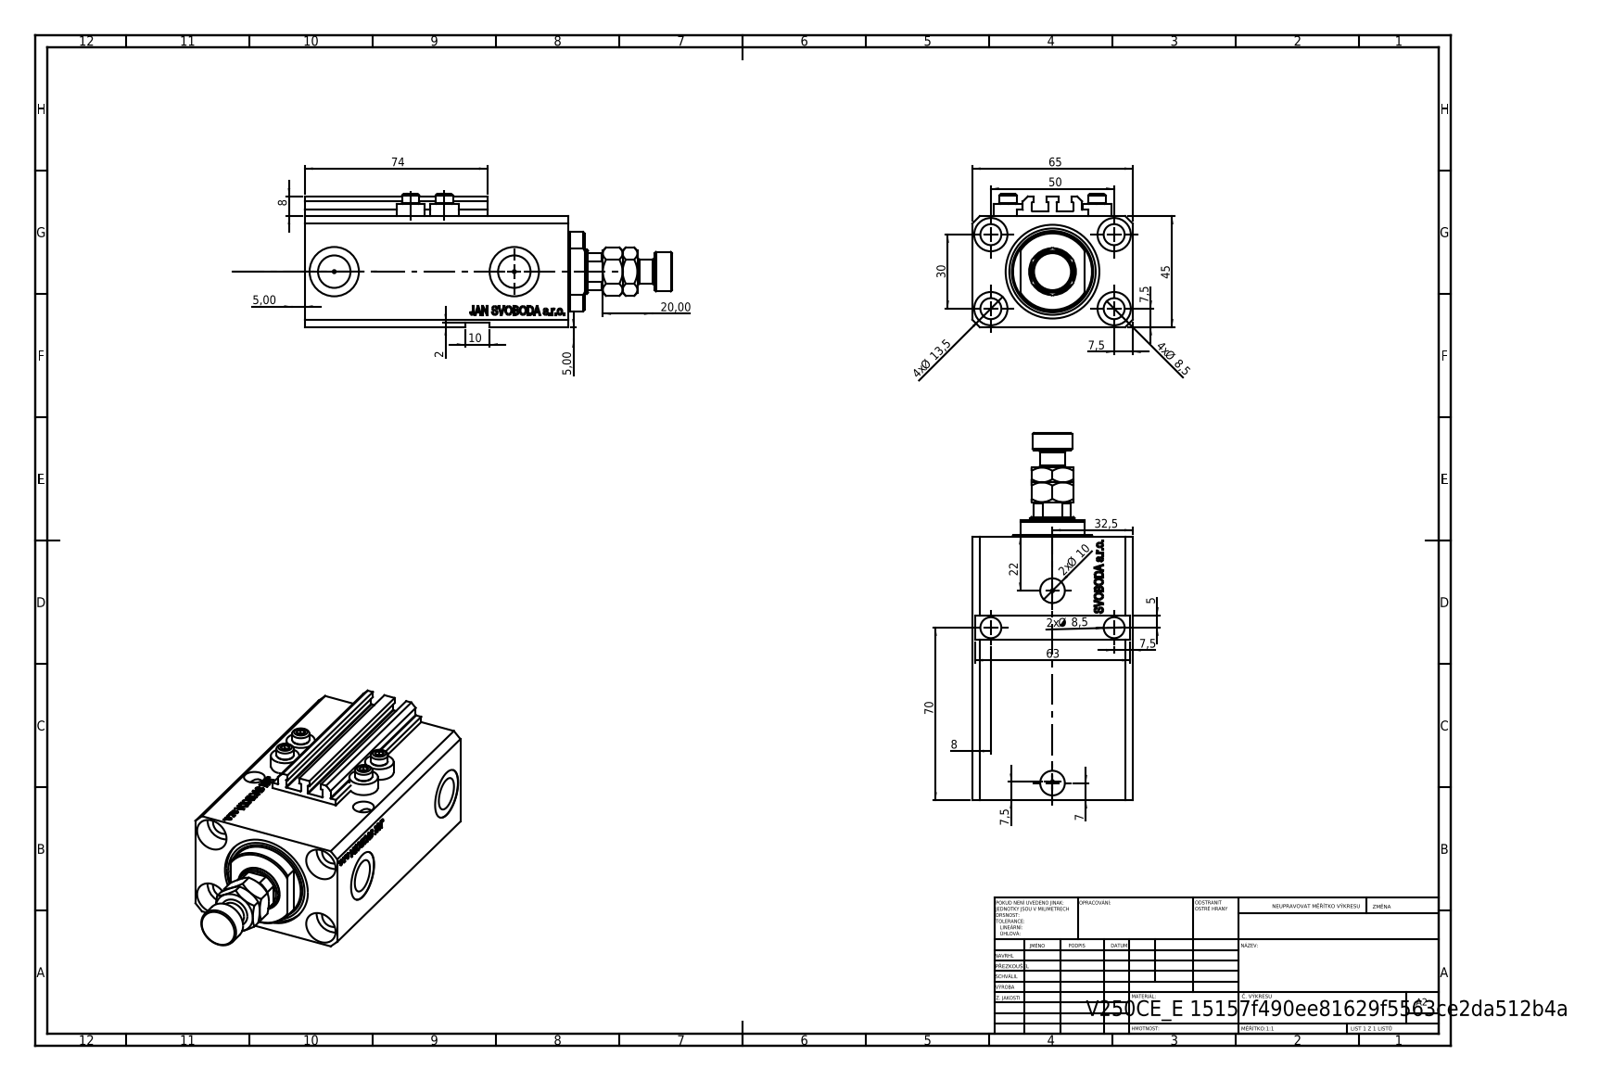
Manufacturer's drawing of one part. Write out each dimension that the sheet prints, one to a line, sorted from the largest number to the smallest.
74
70
65
63
50
45
32,5
30
22
20,00
4x Ø 13,5
10
2x Ø 10
4x Ø 8,5
2x Ø 8,5
8
8
7,5
7,5
7,5
7,5
7
5,00
5,00
5
2
